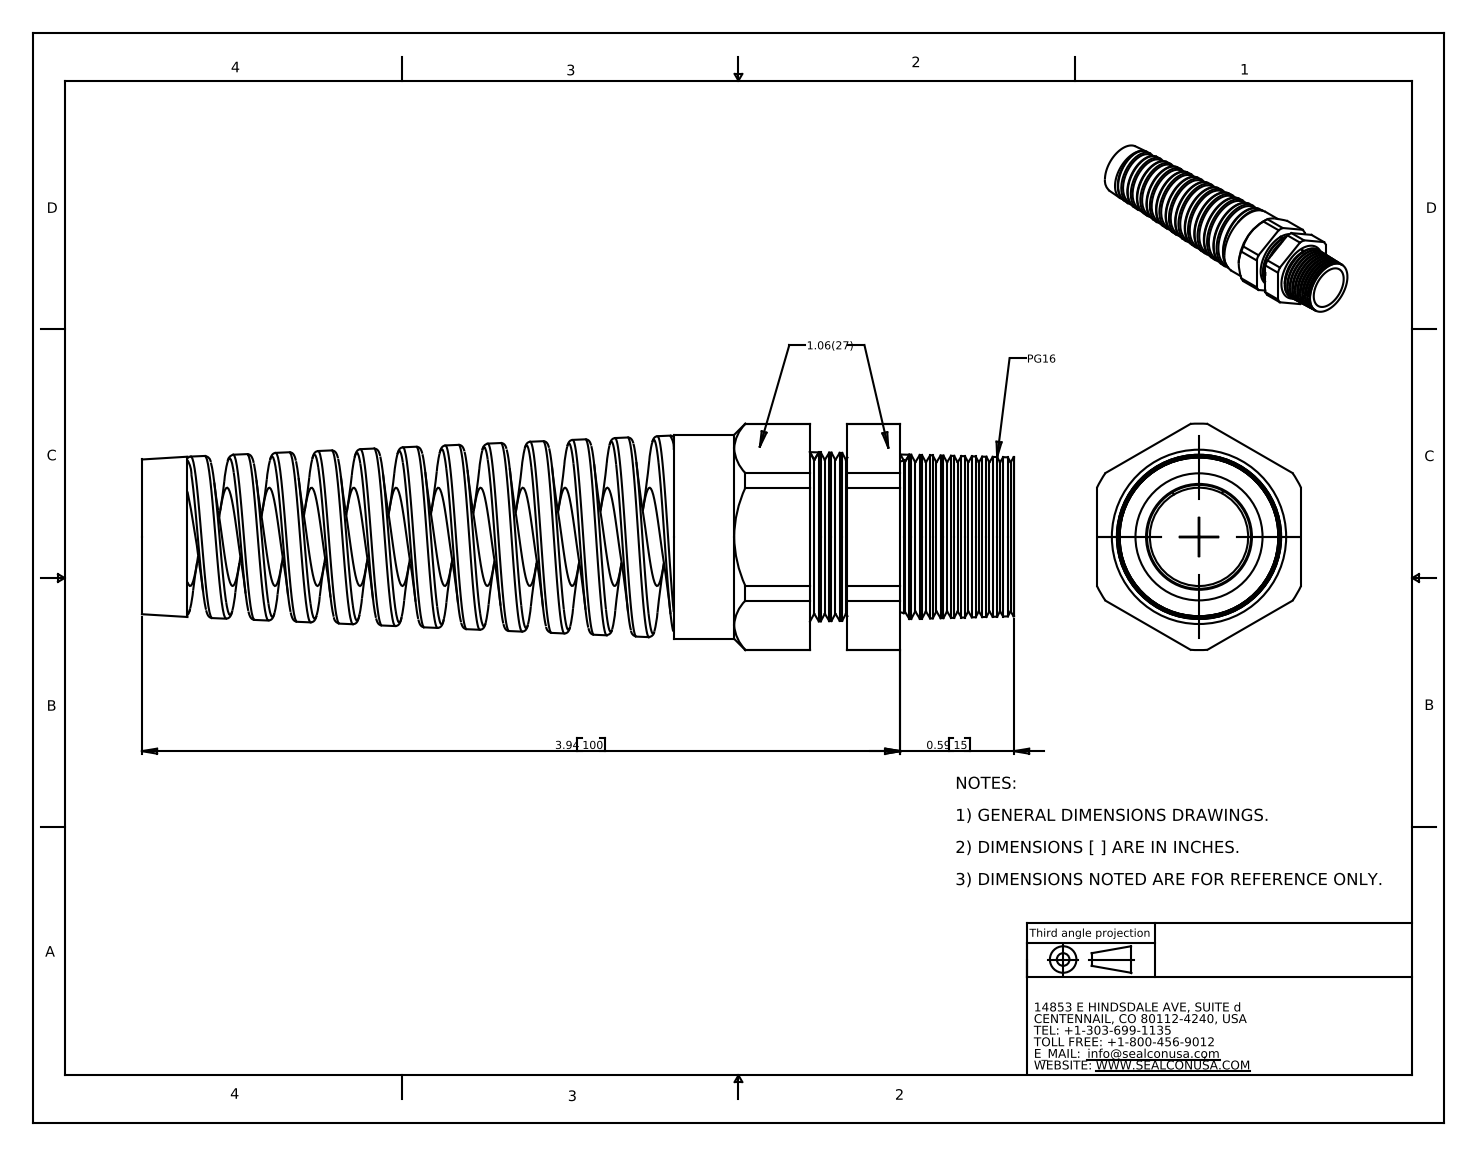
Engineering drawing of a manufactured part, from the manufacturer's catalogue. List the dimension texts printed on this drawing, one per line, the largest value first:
3.94 100
0.59 15
